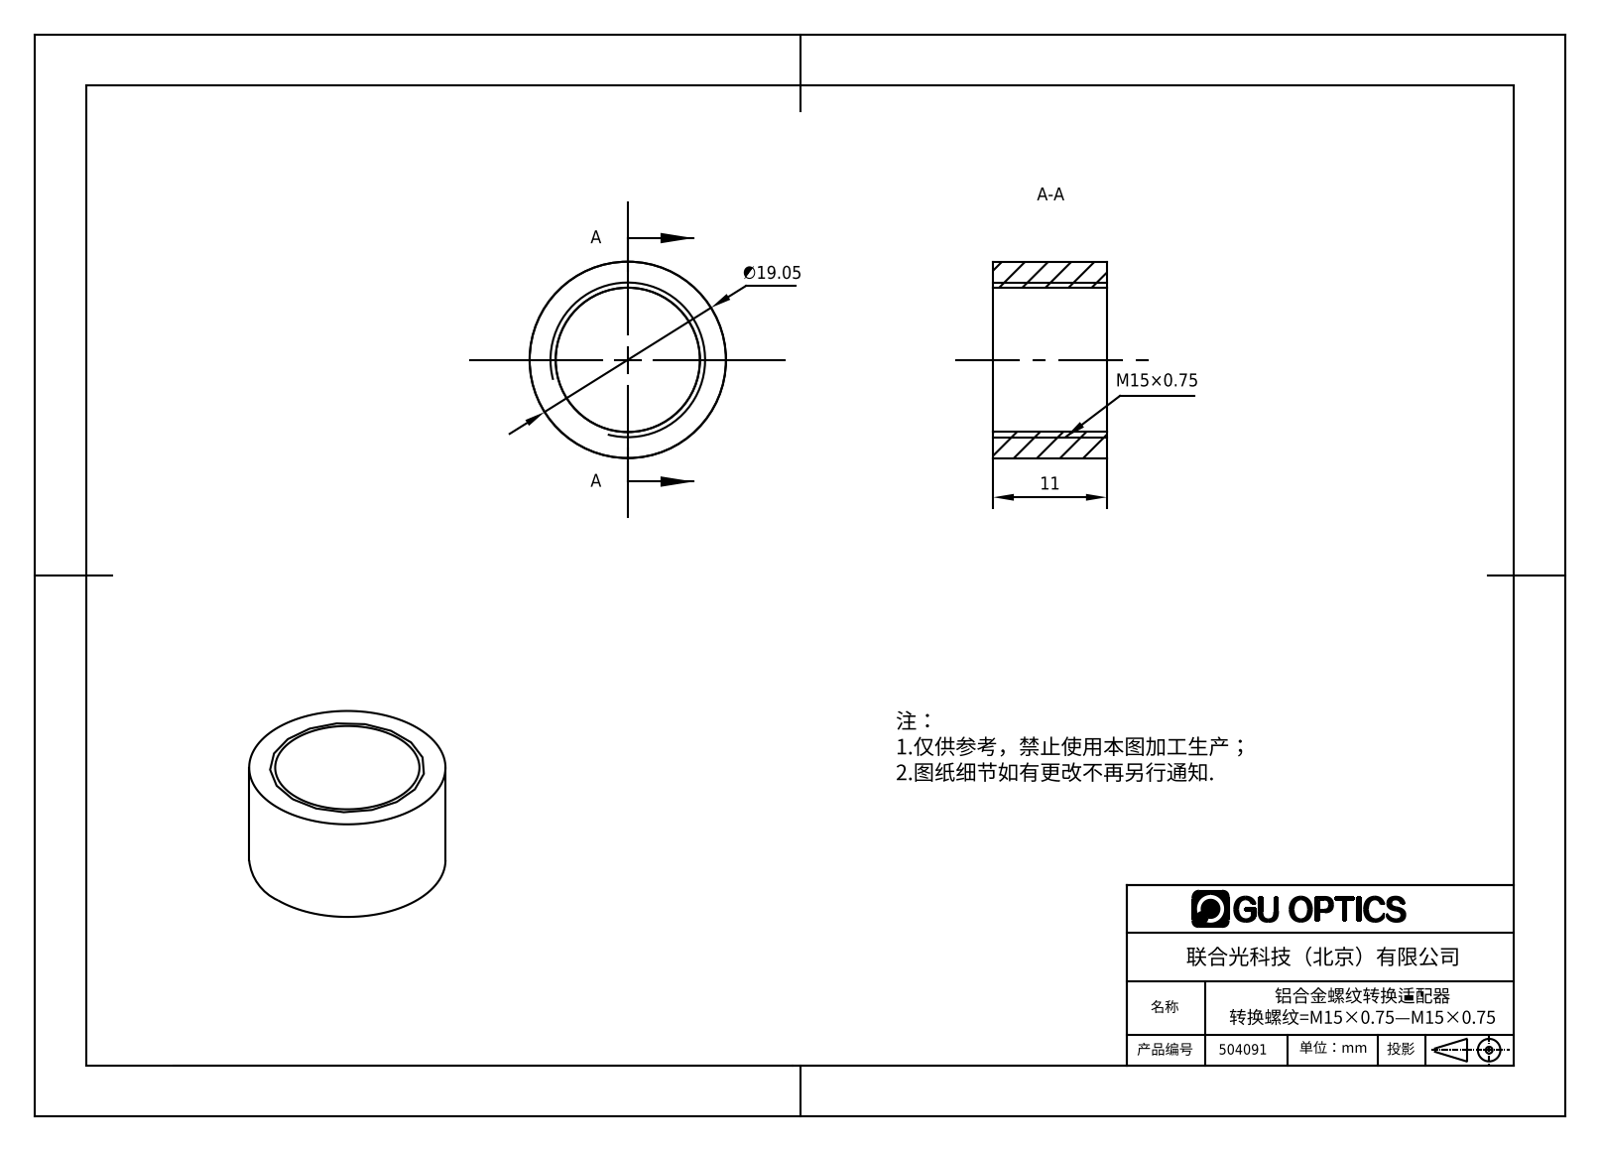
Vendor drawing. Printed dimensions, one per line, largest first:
∅19.05
11
